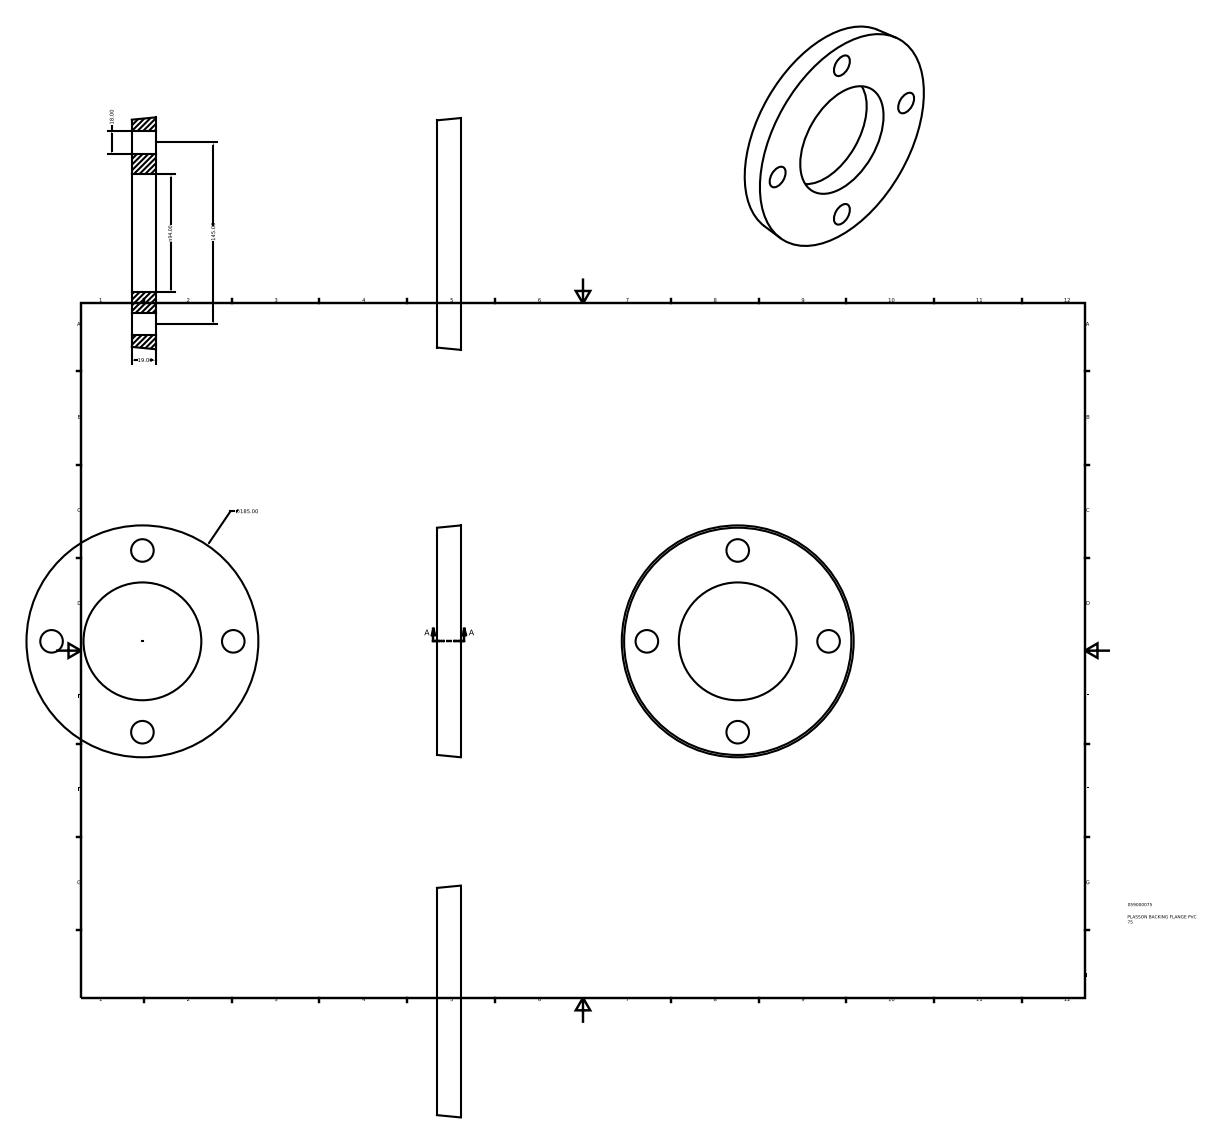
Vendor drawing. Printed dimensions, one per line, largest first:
∅185.00
145.00
n94.00
19.00
18.00
